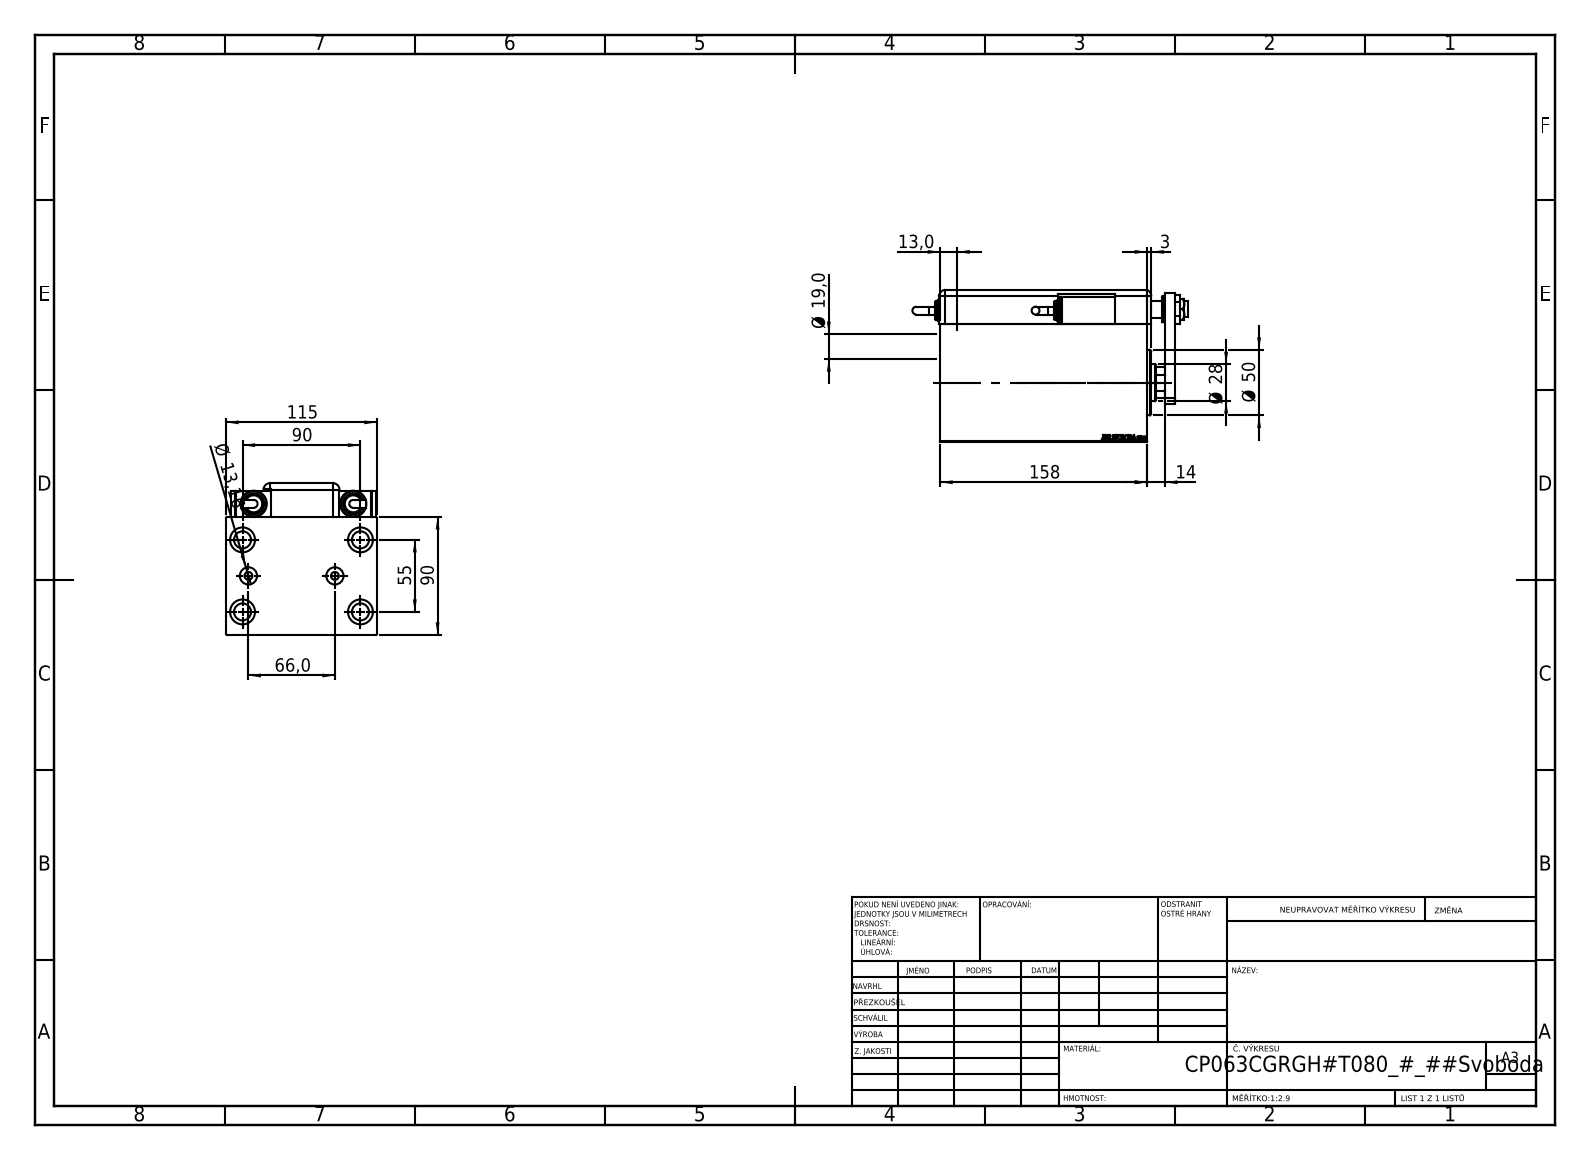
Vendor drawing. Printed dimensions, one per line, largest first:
158
115
90
90
66,0
55
Ø 50
Ø 28
Ø 19,0
14
Ø 13,16
13,0
3
